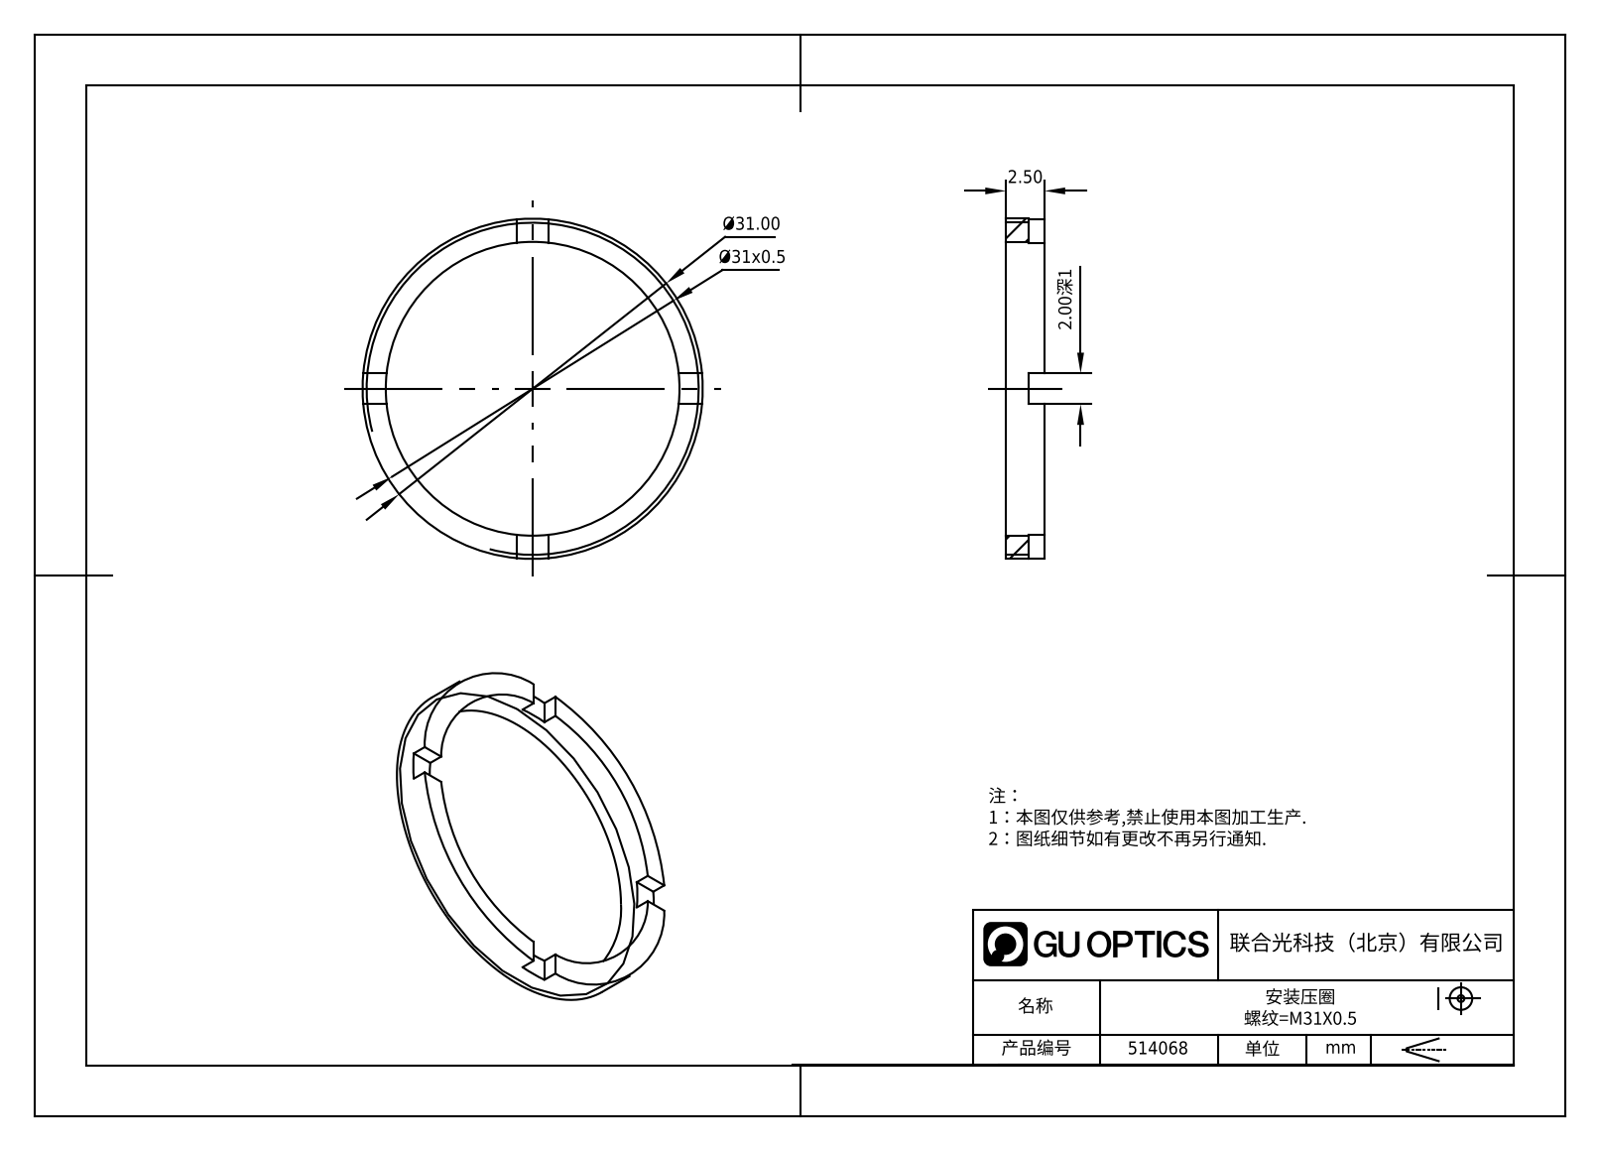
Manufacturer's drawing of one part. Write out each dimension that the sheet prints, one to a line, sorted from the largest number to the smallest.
Ø31.00
Ø31x0.5
2.50
2.00深1
